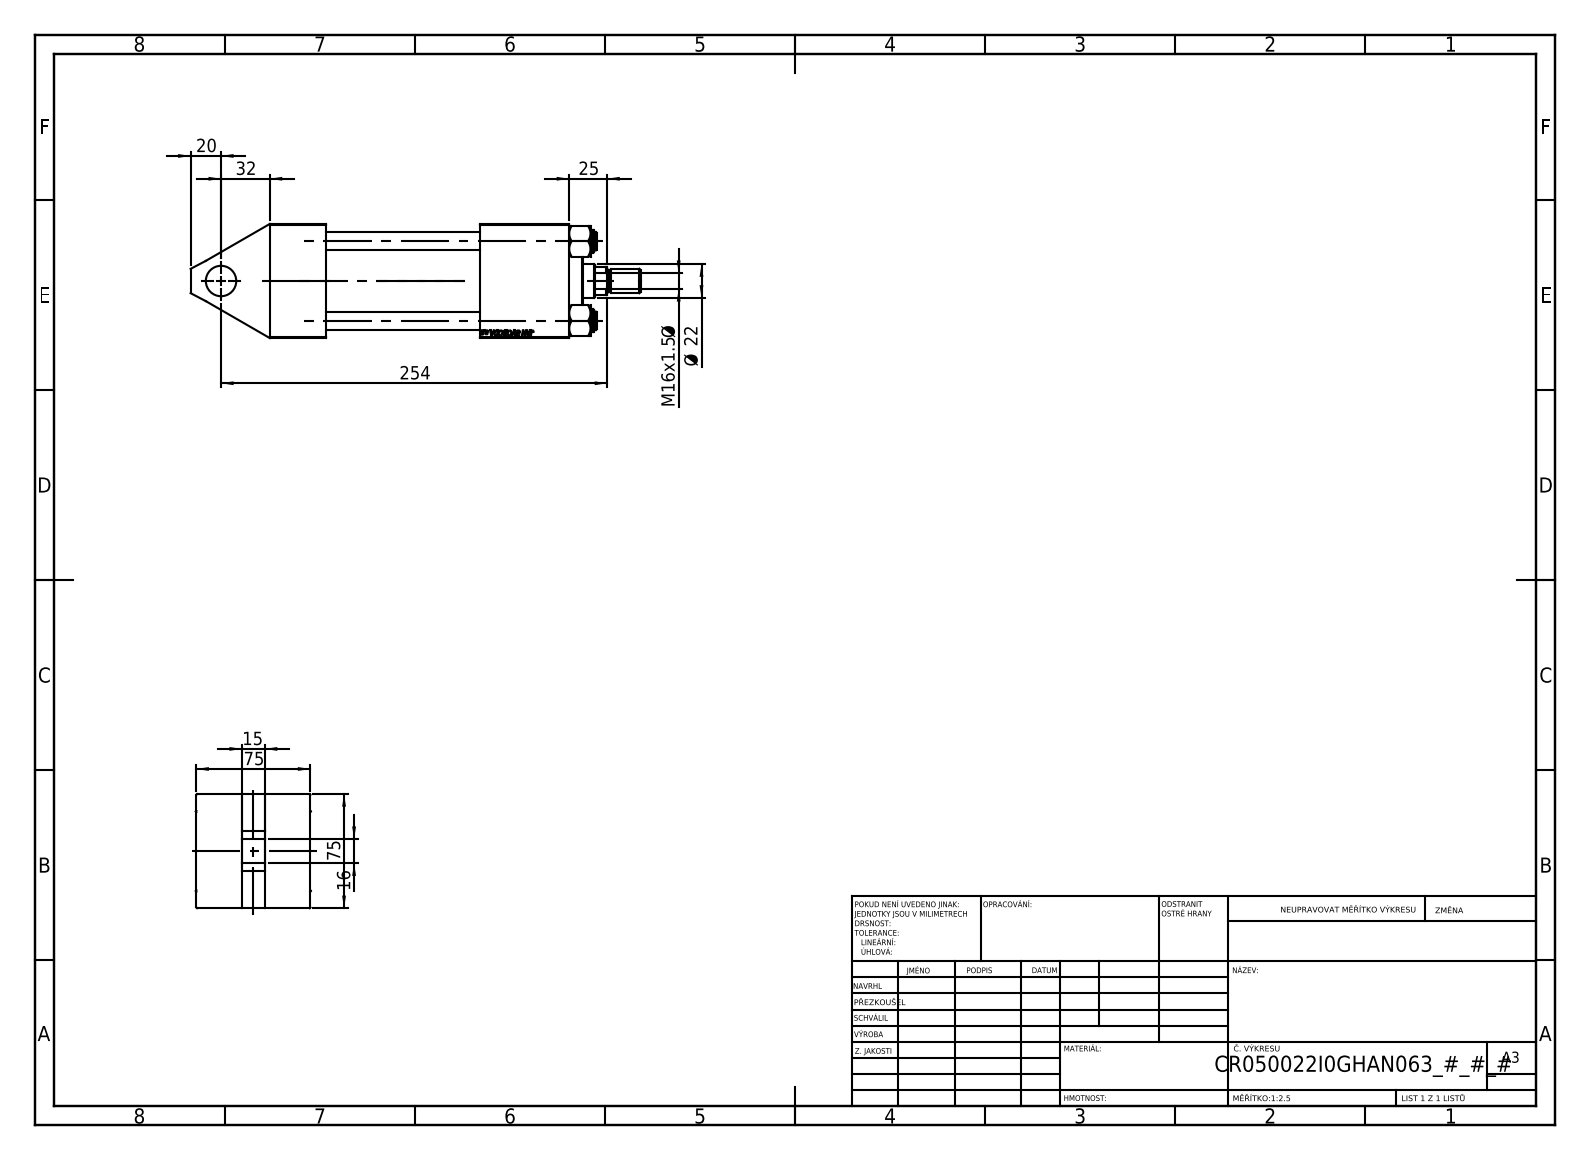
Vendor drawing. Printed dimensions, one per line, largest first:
254
75
75
32
25
Ø 22
20
M16x1.5 Ø
16
15
